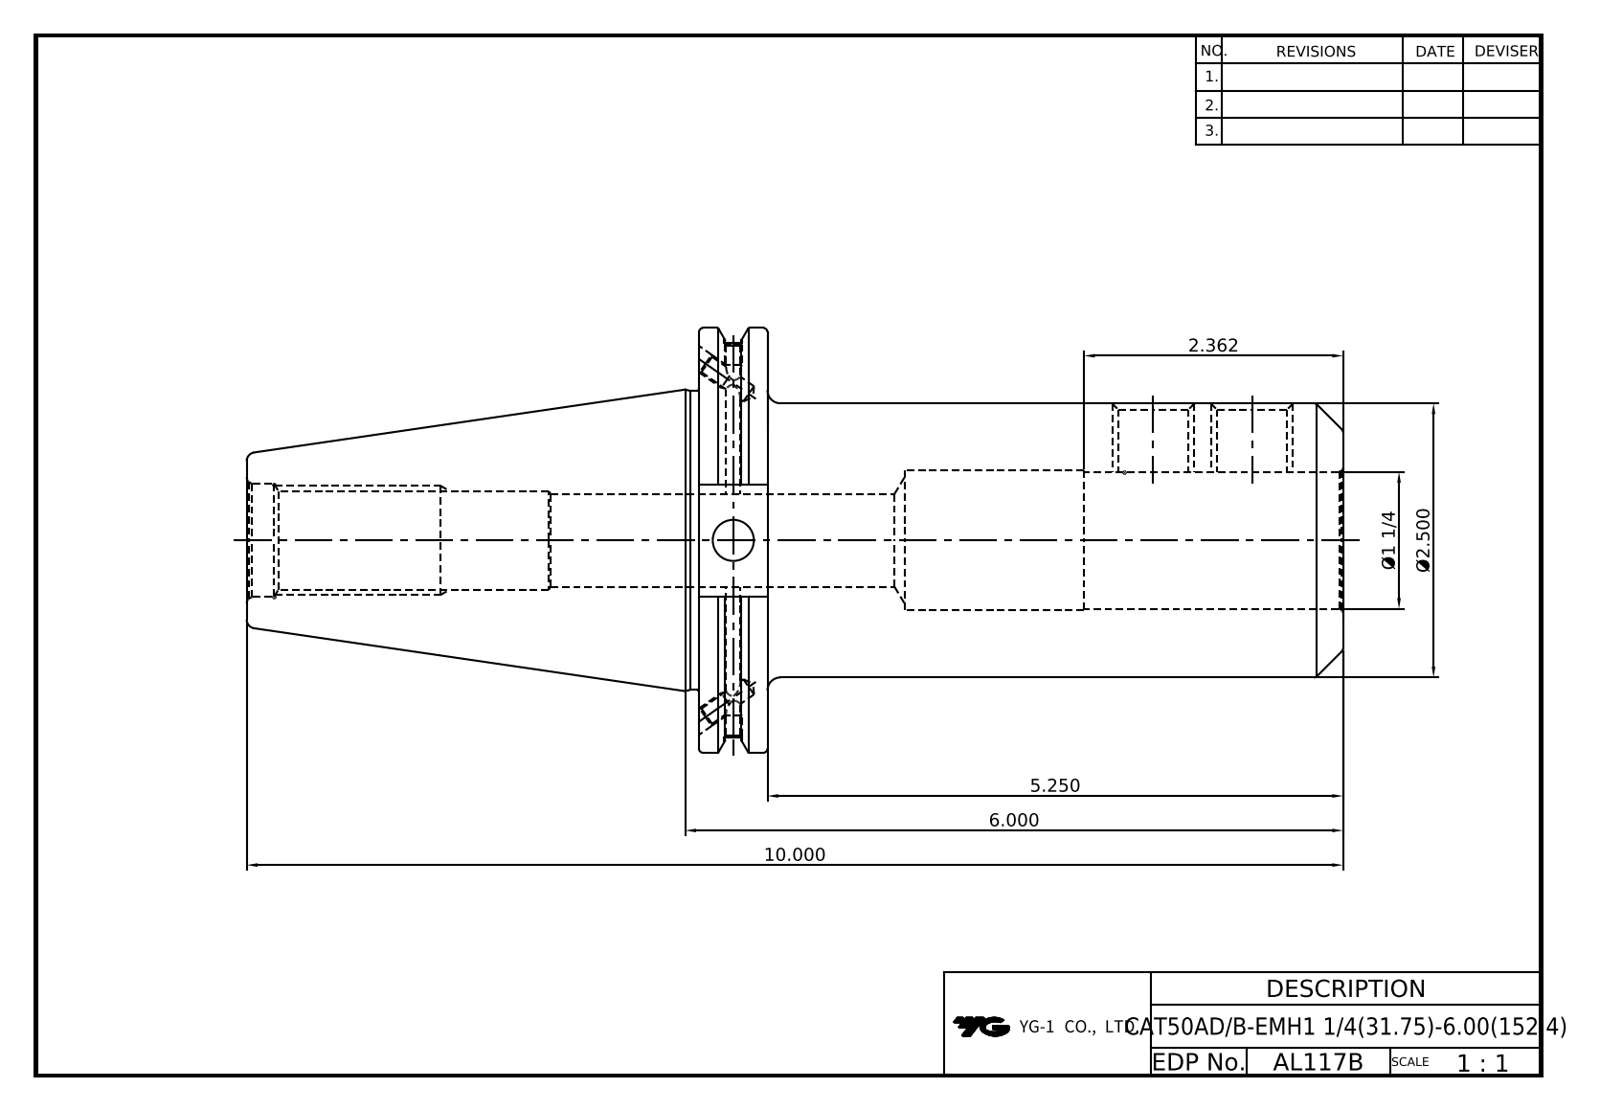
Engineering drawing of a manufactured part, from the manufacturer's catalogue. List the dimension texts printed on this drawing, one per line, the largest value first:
10.000
6.000
5.250
Ø2.500
2.362
Ø1 1/4
